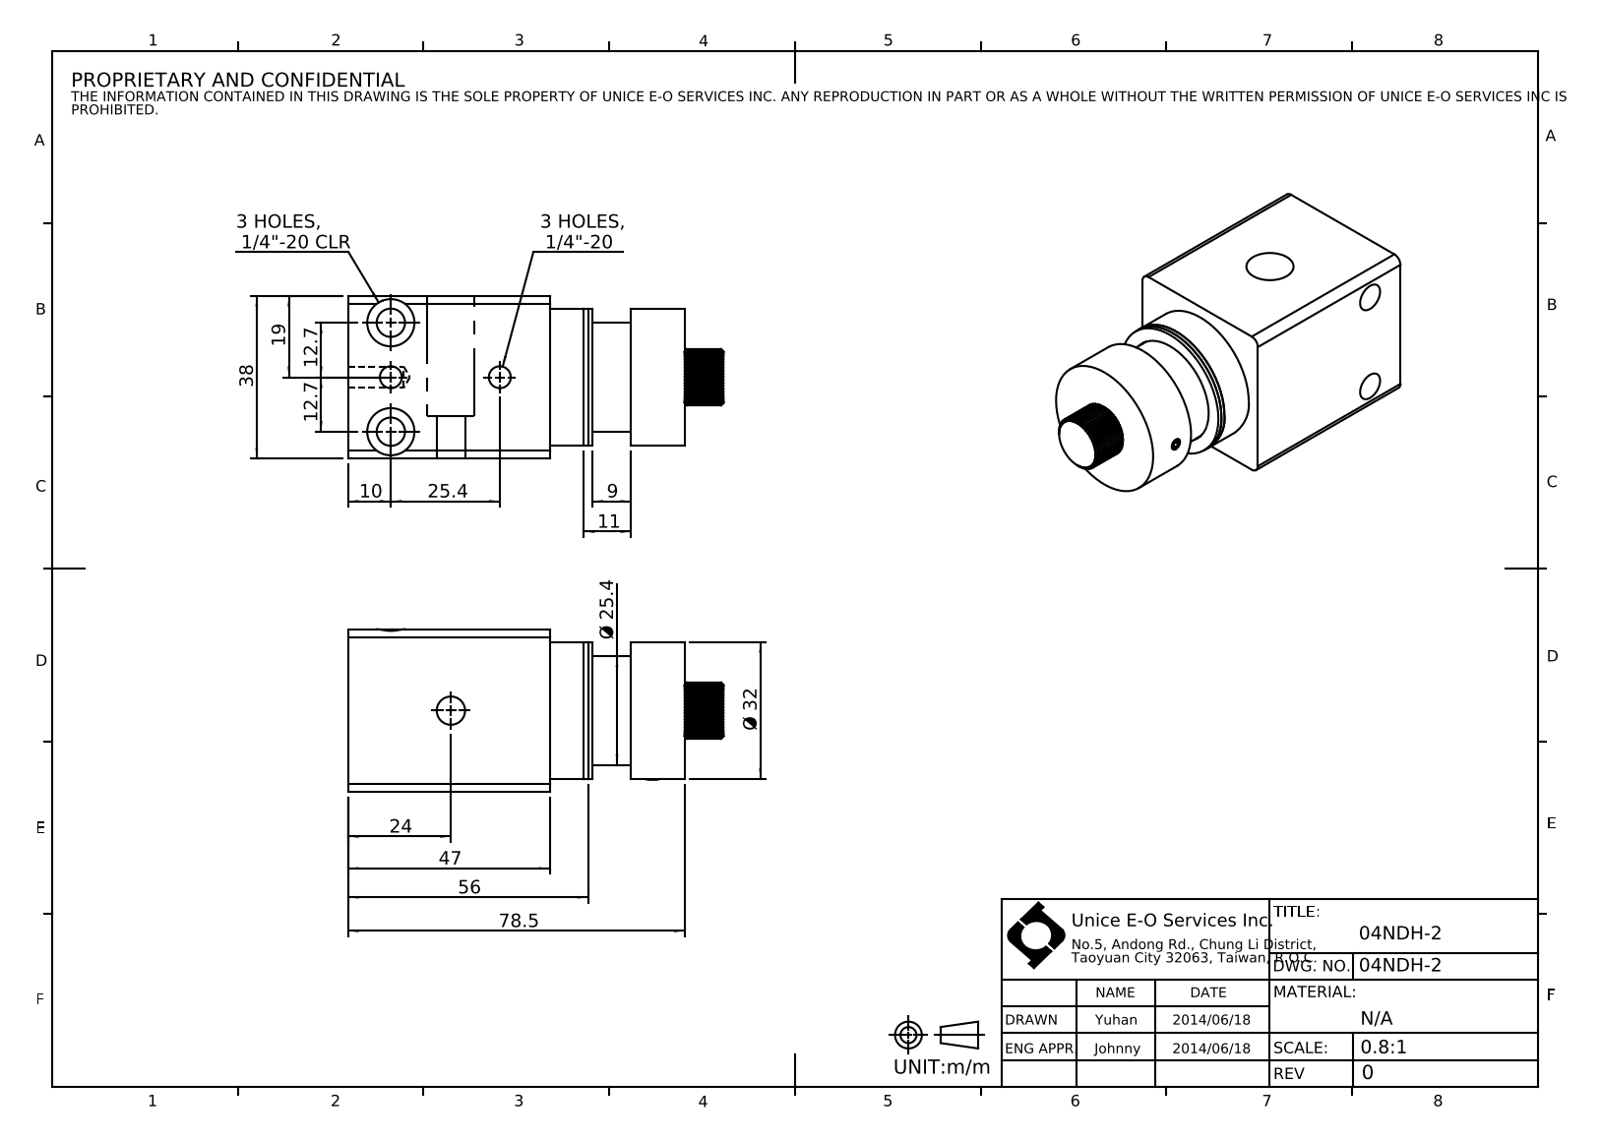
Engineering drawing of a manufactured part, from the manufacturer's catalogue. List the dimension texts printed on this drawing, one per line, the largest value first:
78.5
56
47
38
Ø 32
Ø 25.4
25.4
24
19
12.7
12.7
11
10
9
3 HOLES, 1/4"-20
